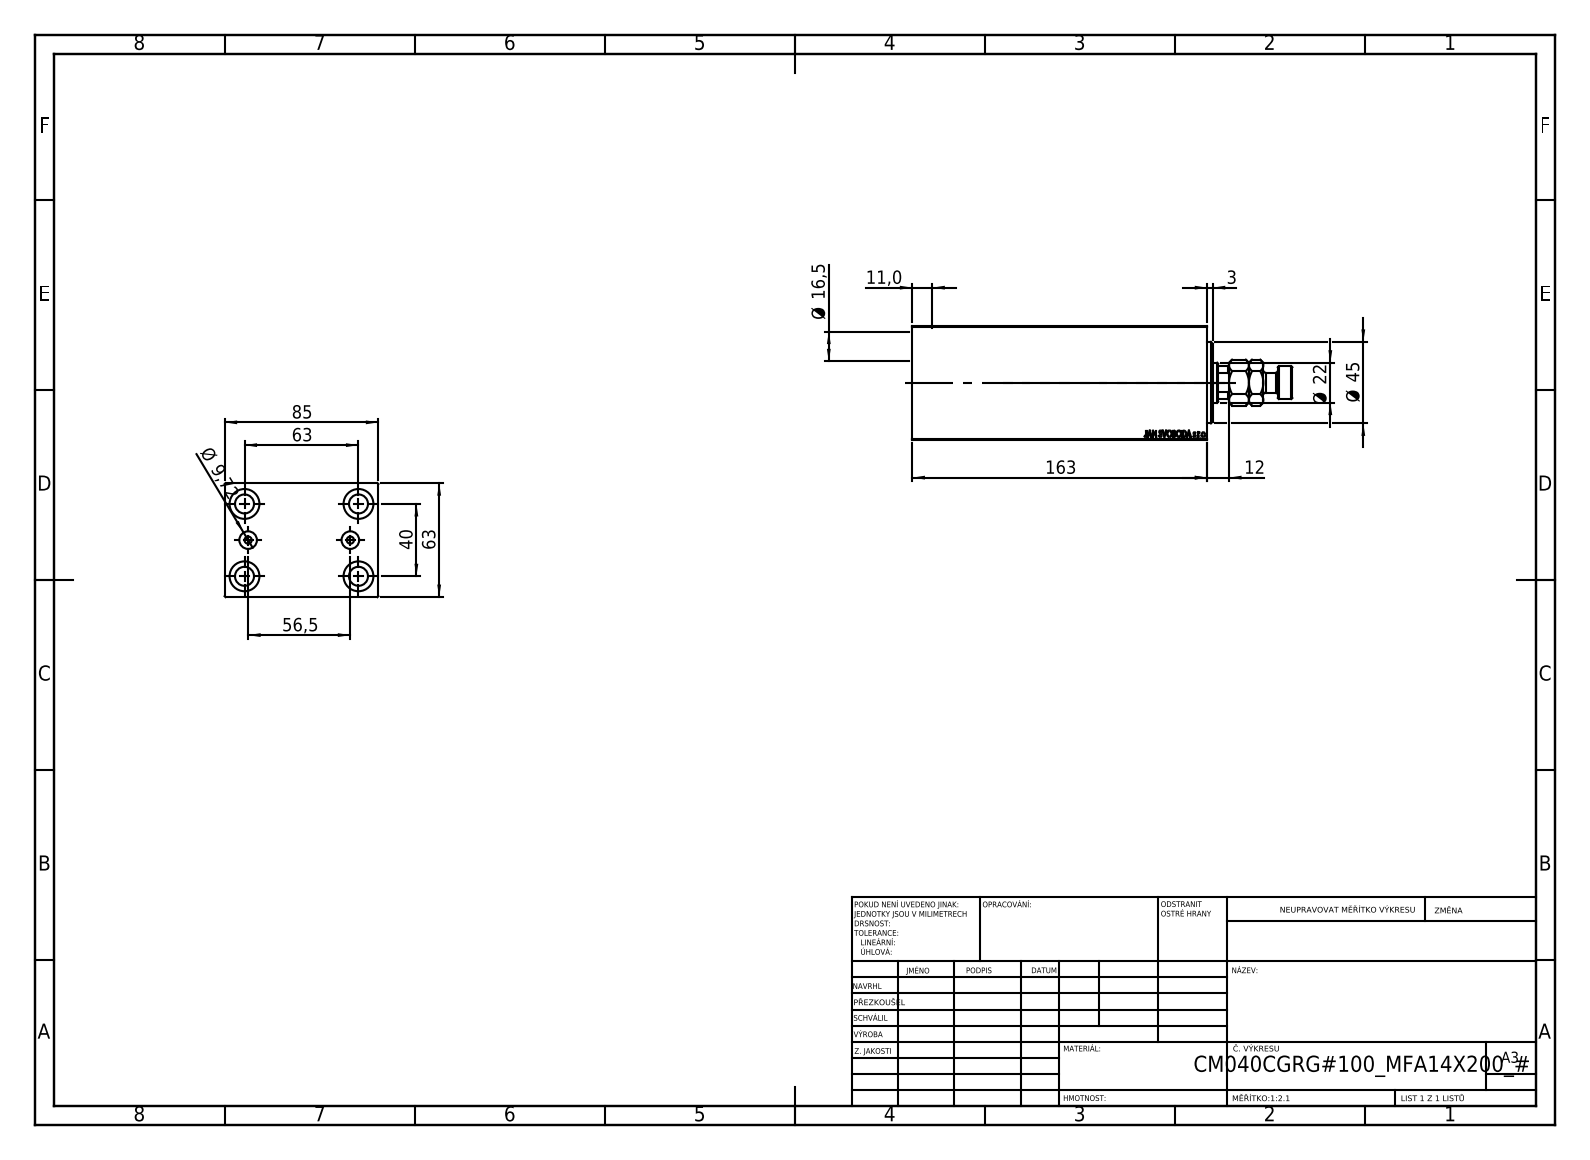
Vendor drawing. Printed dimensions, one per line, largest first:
163
85
63
63
56,5
Ø 45
40
Ø 22
Ø 16,5
12
11,0
Ø 9,72
3
